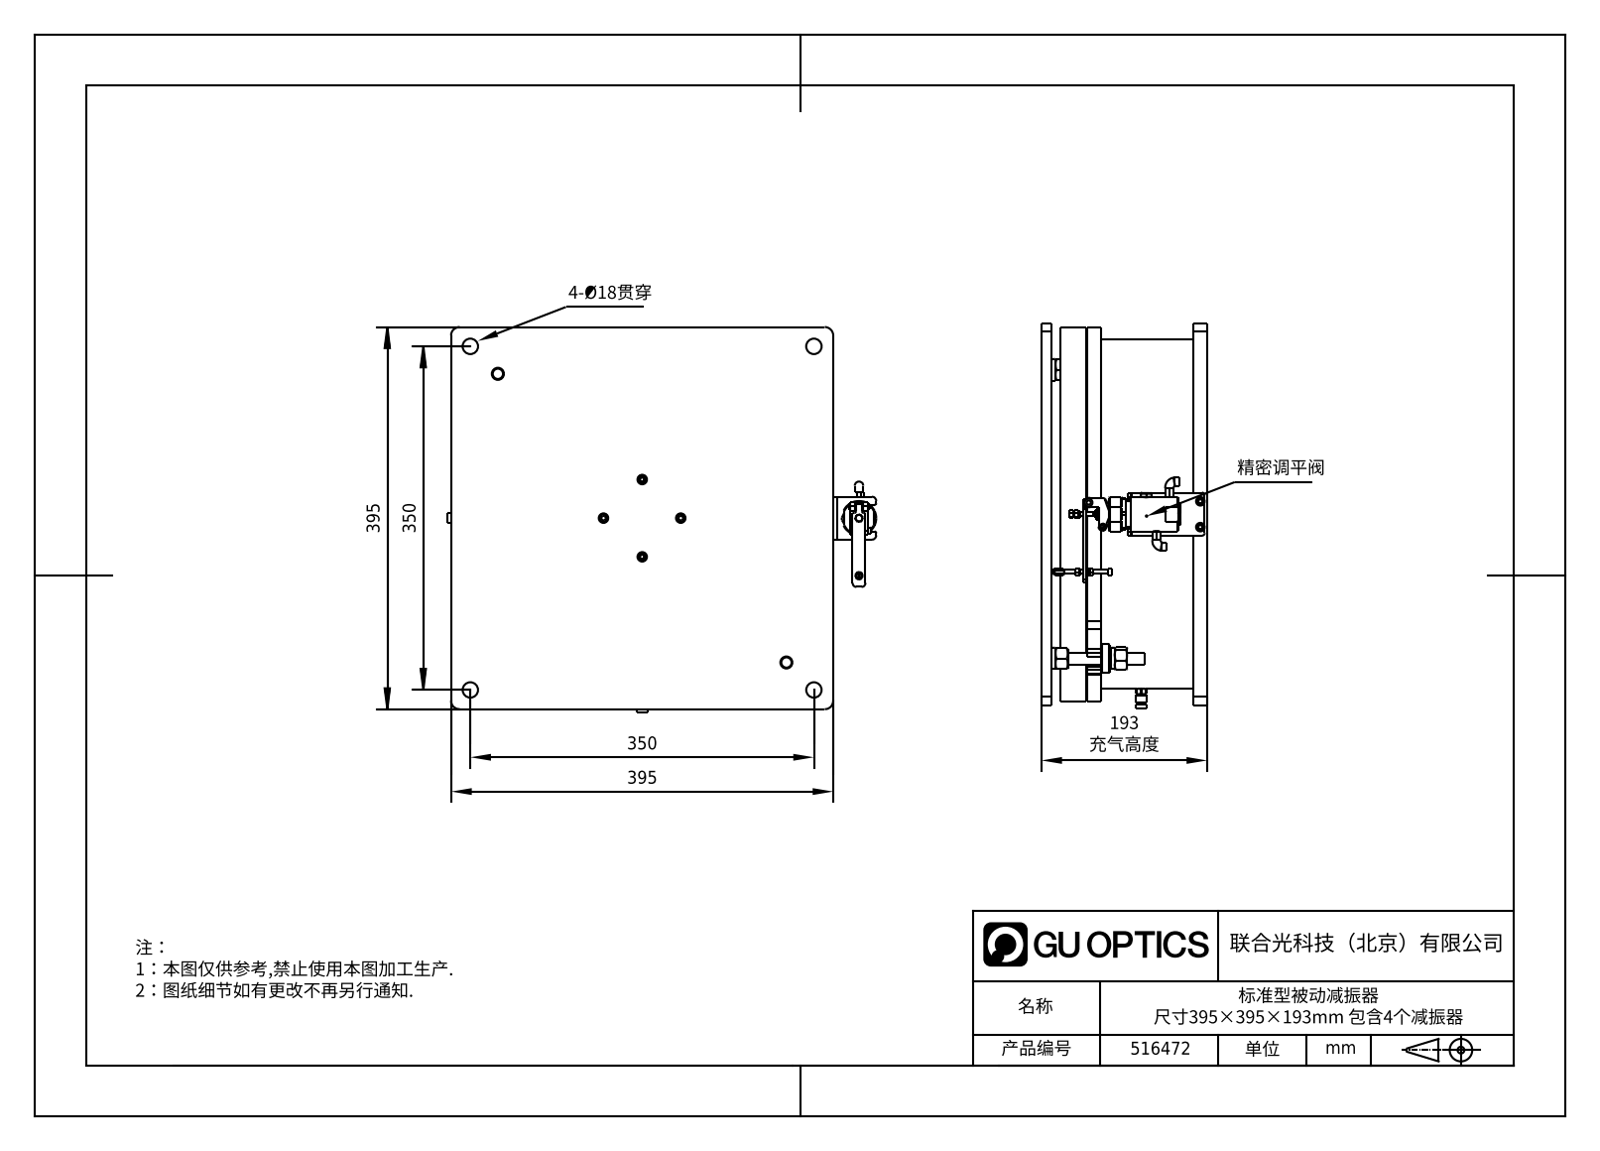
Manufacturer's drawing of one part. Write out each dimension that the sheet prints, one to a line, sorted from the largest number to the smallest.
395
395
350
350
193 充气高度
